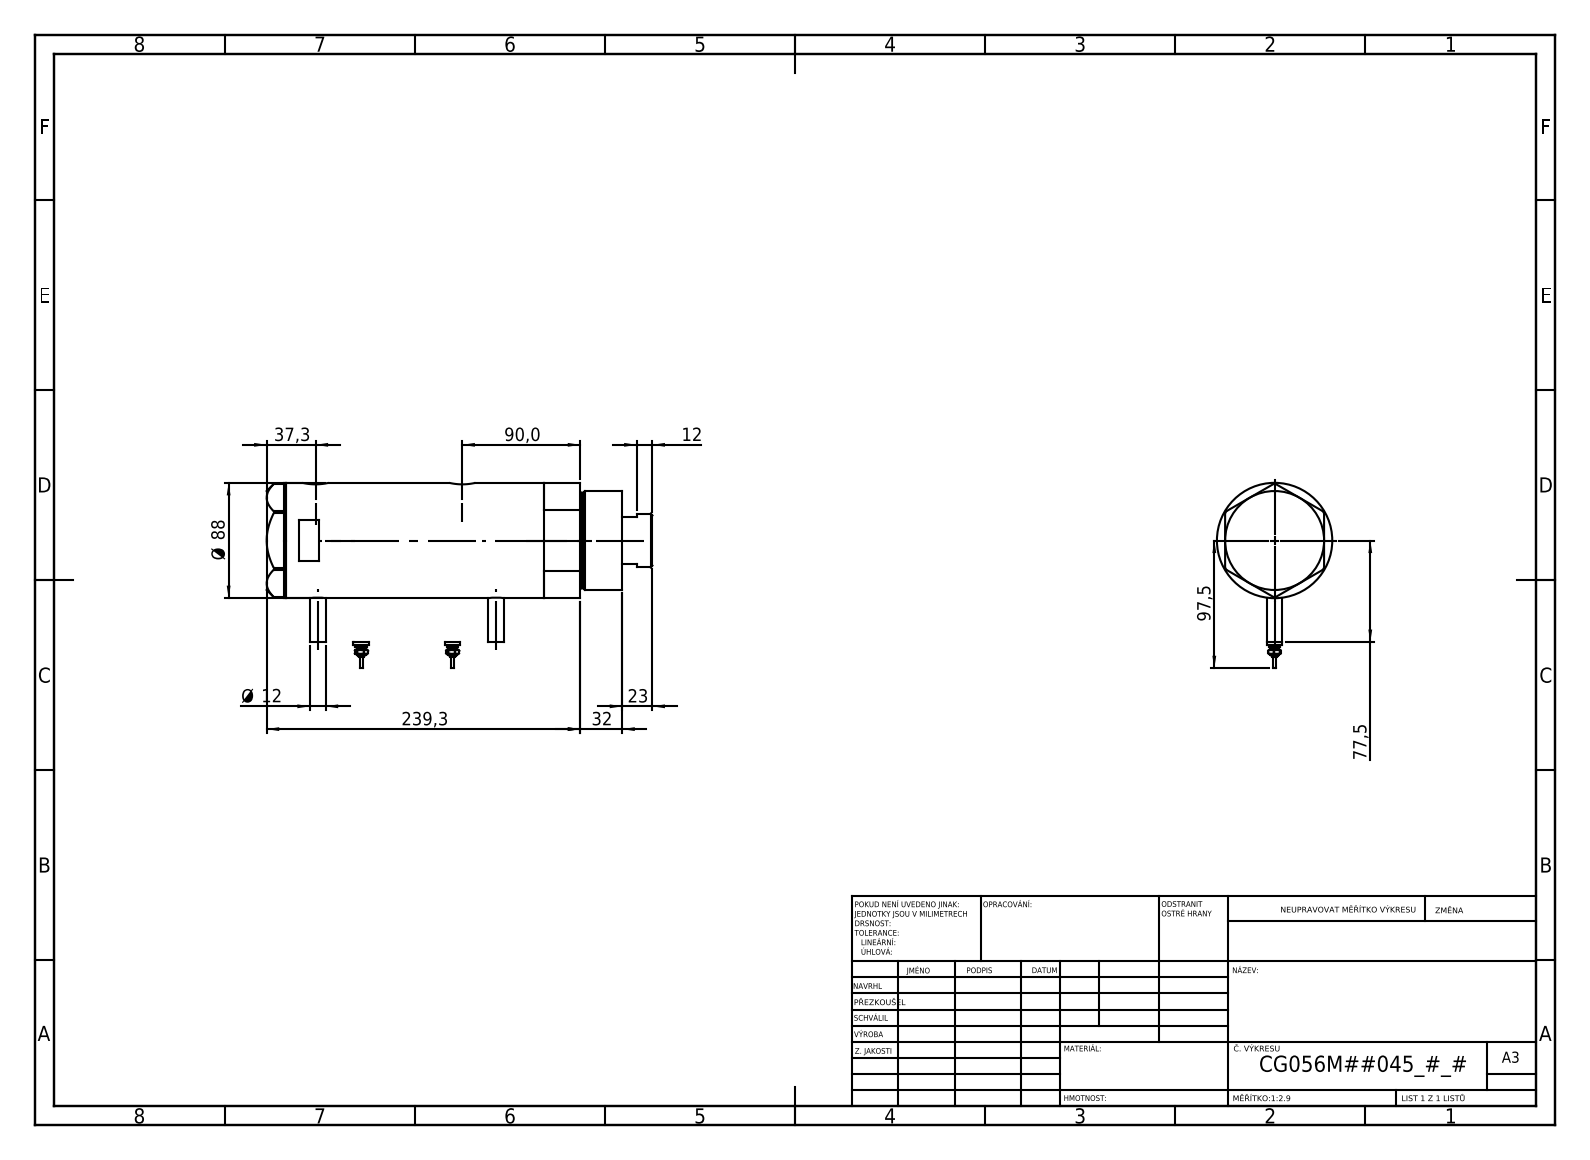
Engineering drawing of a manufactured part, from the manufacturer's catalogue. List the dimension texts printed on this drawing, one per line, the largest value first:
239,3
97,5
90,0
Ø 88
77,5
37,3
32
23
12
Ø 12
